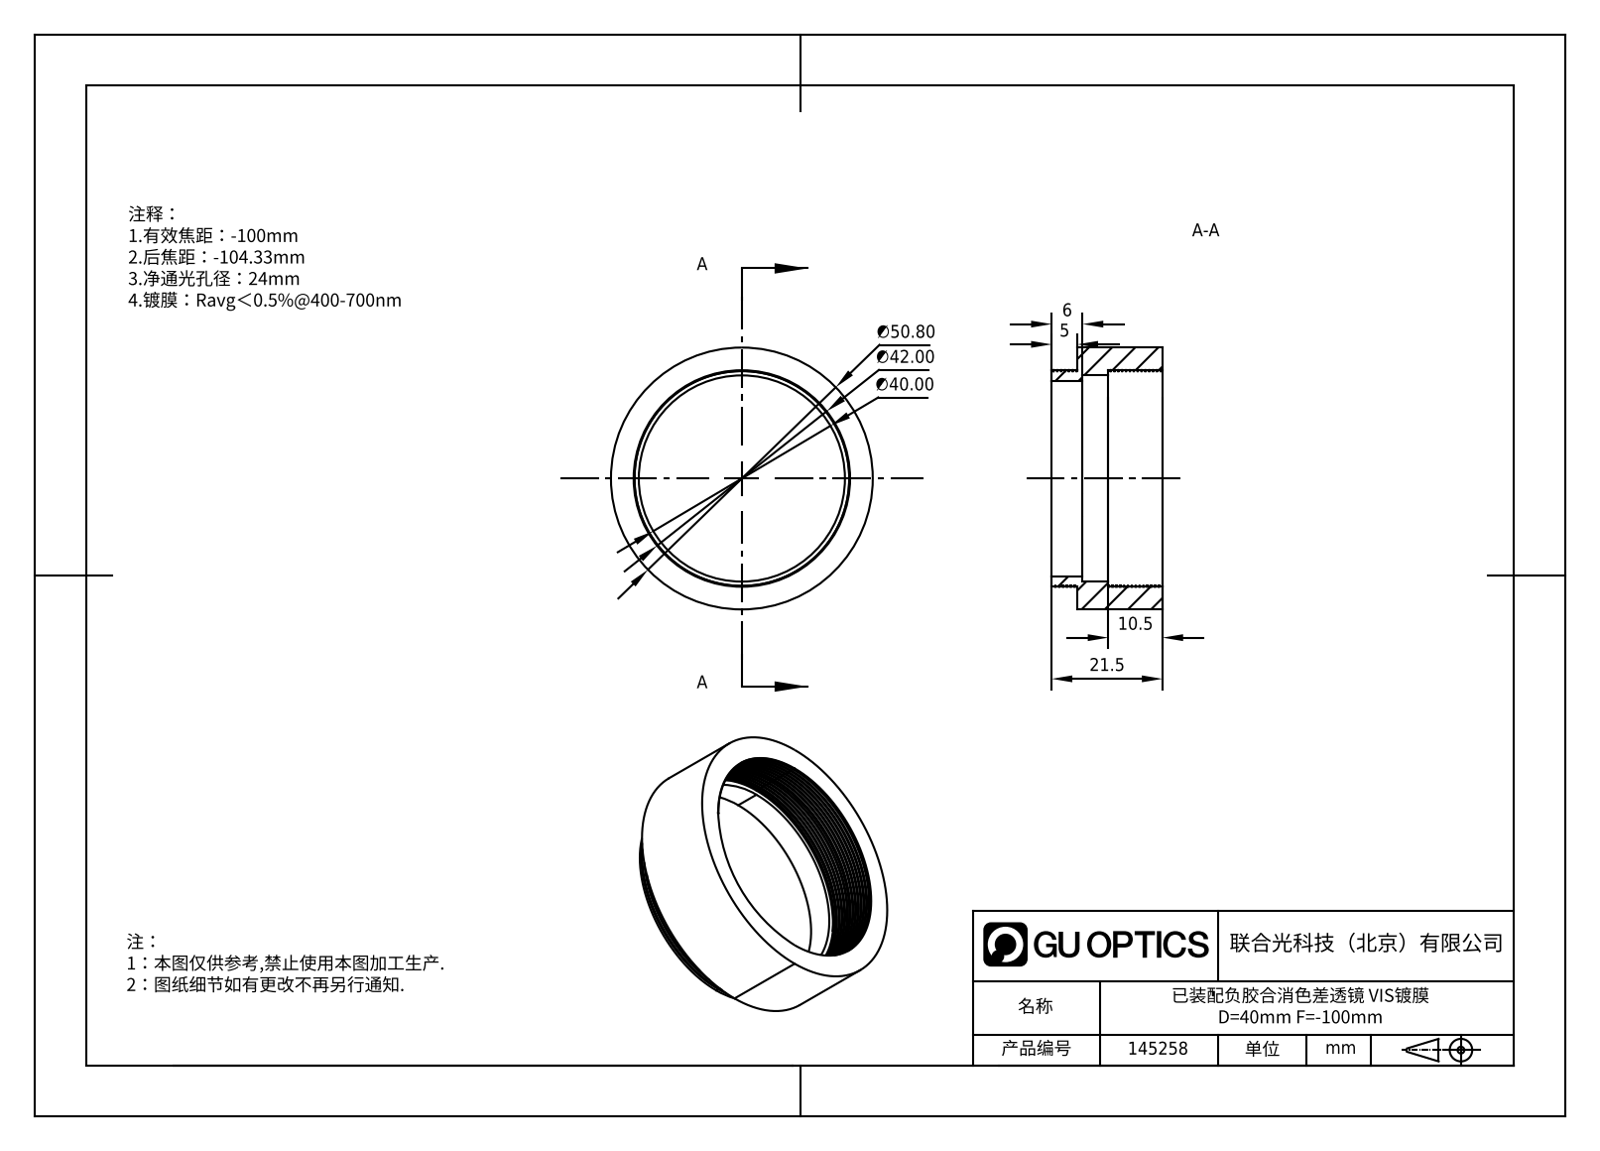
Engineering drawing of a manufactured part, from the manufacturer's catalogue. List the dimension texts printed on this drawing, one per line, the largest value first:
∅50.80
∅42.00
∅40.00
21.5
10.5
6
5
